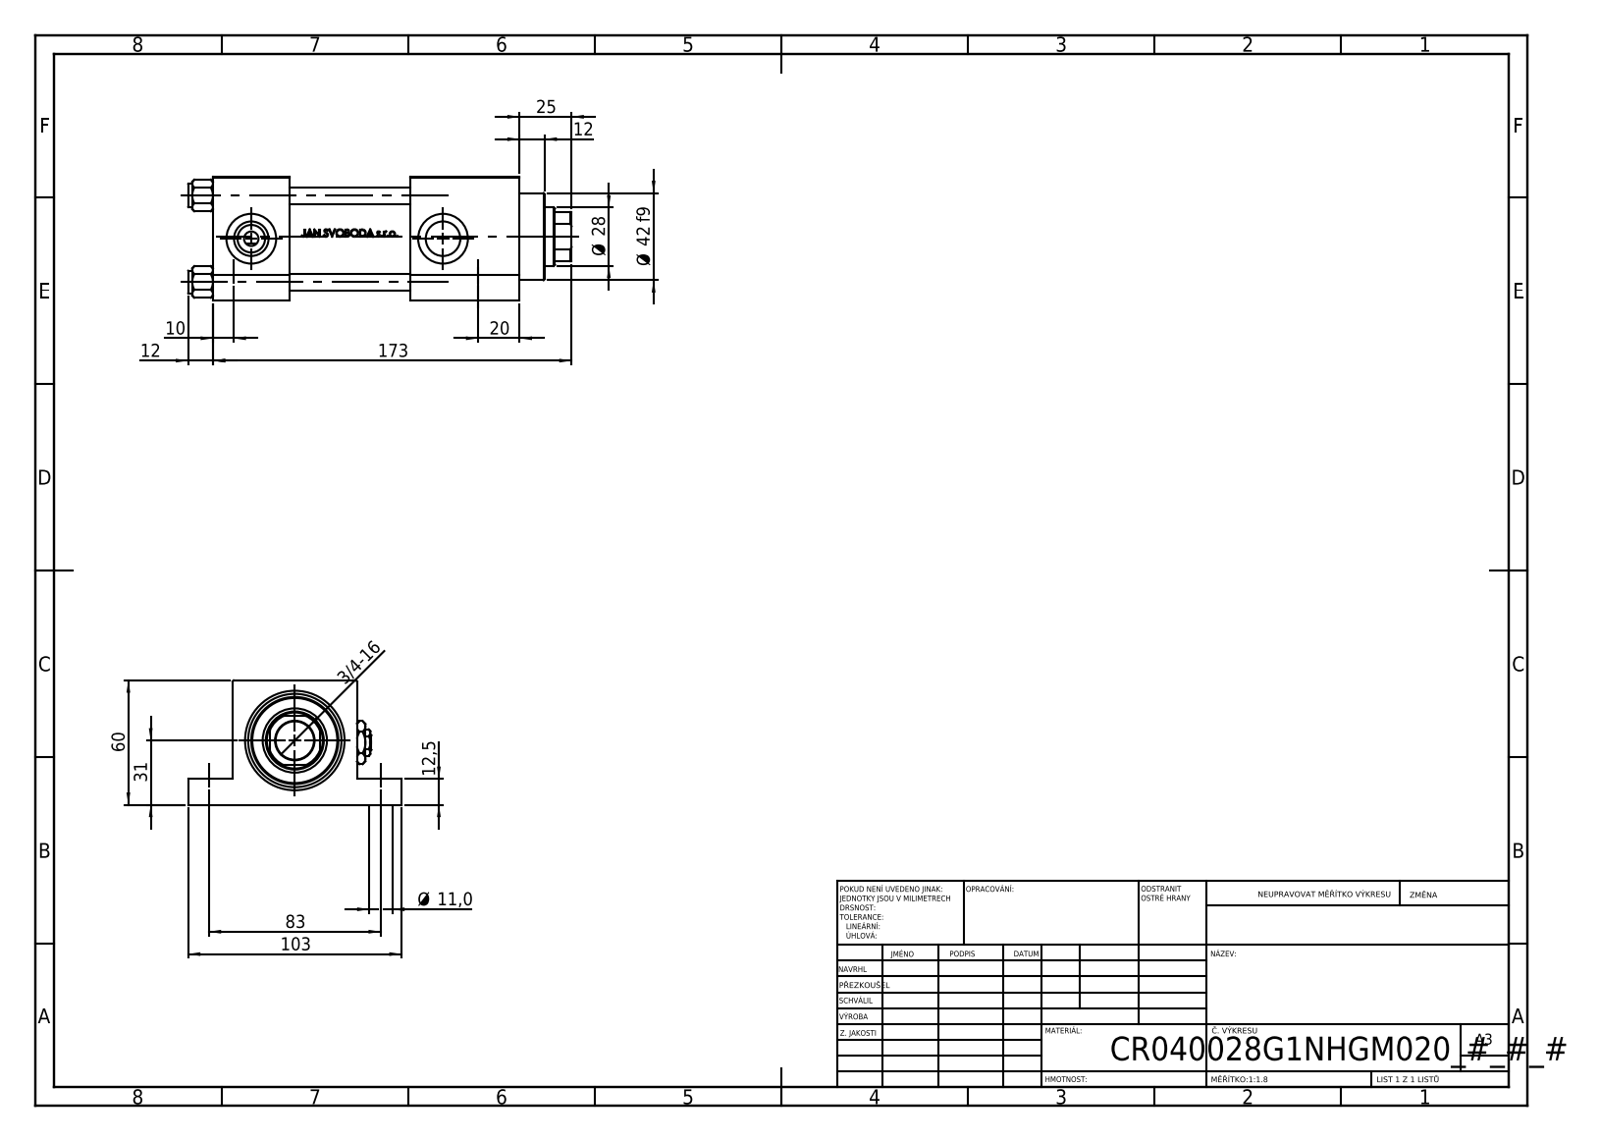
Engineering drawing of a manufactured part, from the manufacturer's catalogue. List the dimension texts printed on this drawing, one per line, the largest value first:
173
103
83
60
Ø 42 f9
31
Ø 28
25
20
12,5
12
12
Ø 11,0
10
3/4-16
